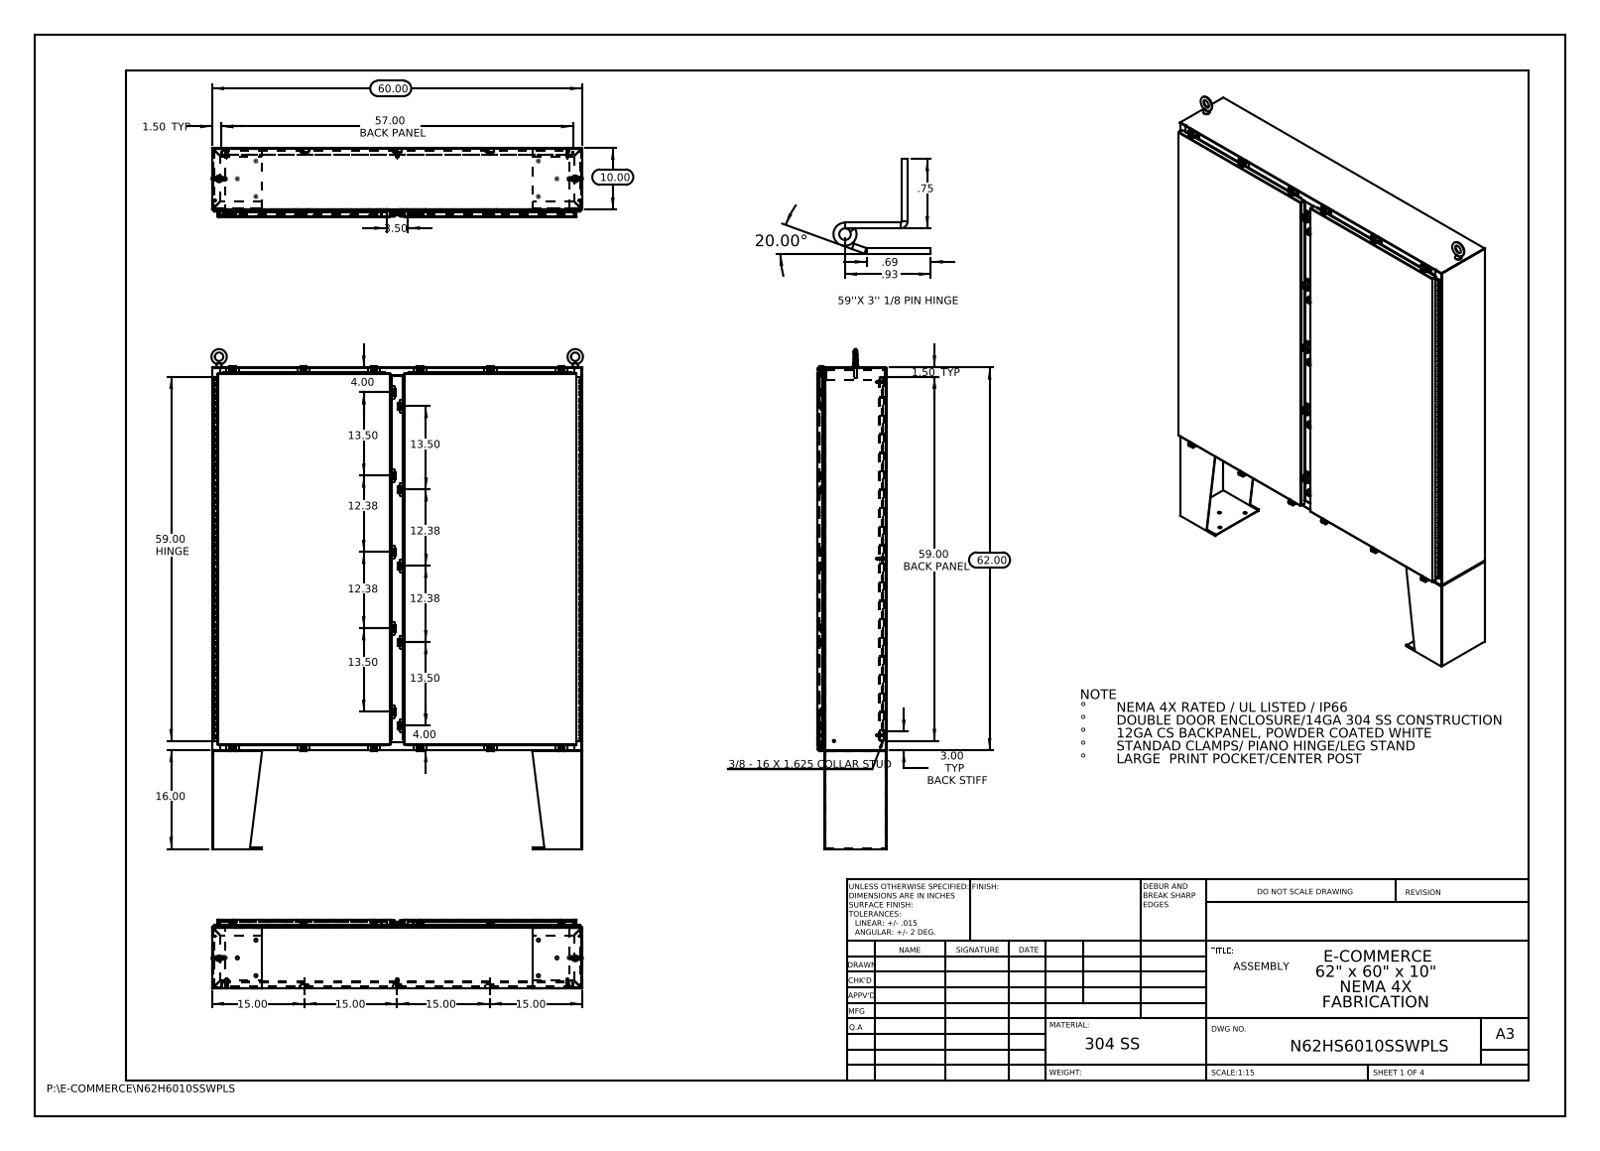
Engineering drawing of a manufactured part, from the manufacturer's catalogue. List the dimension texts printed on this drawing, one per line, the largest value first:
62.00
60.00
59.00 HINGE
59.00 BACK PANEL
57.00 BACK PANEL
20.00°
16.00
15.00
15.00
15.00
15.00
13.50
13.50
13.50
13.50
12.38
12.38
12.38
12.38
10.00
4.00
4.00
3.50
3.00 TYP BACK STIFF
1.50 TYP
1.50 TYP
.93
.75
.69
